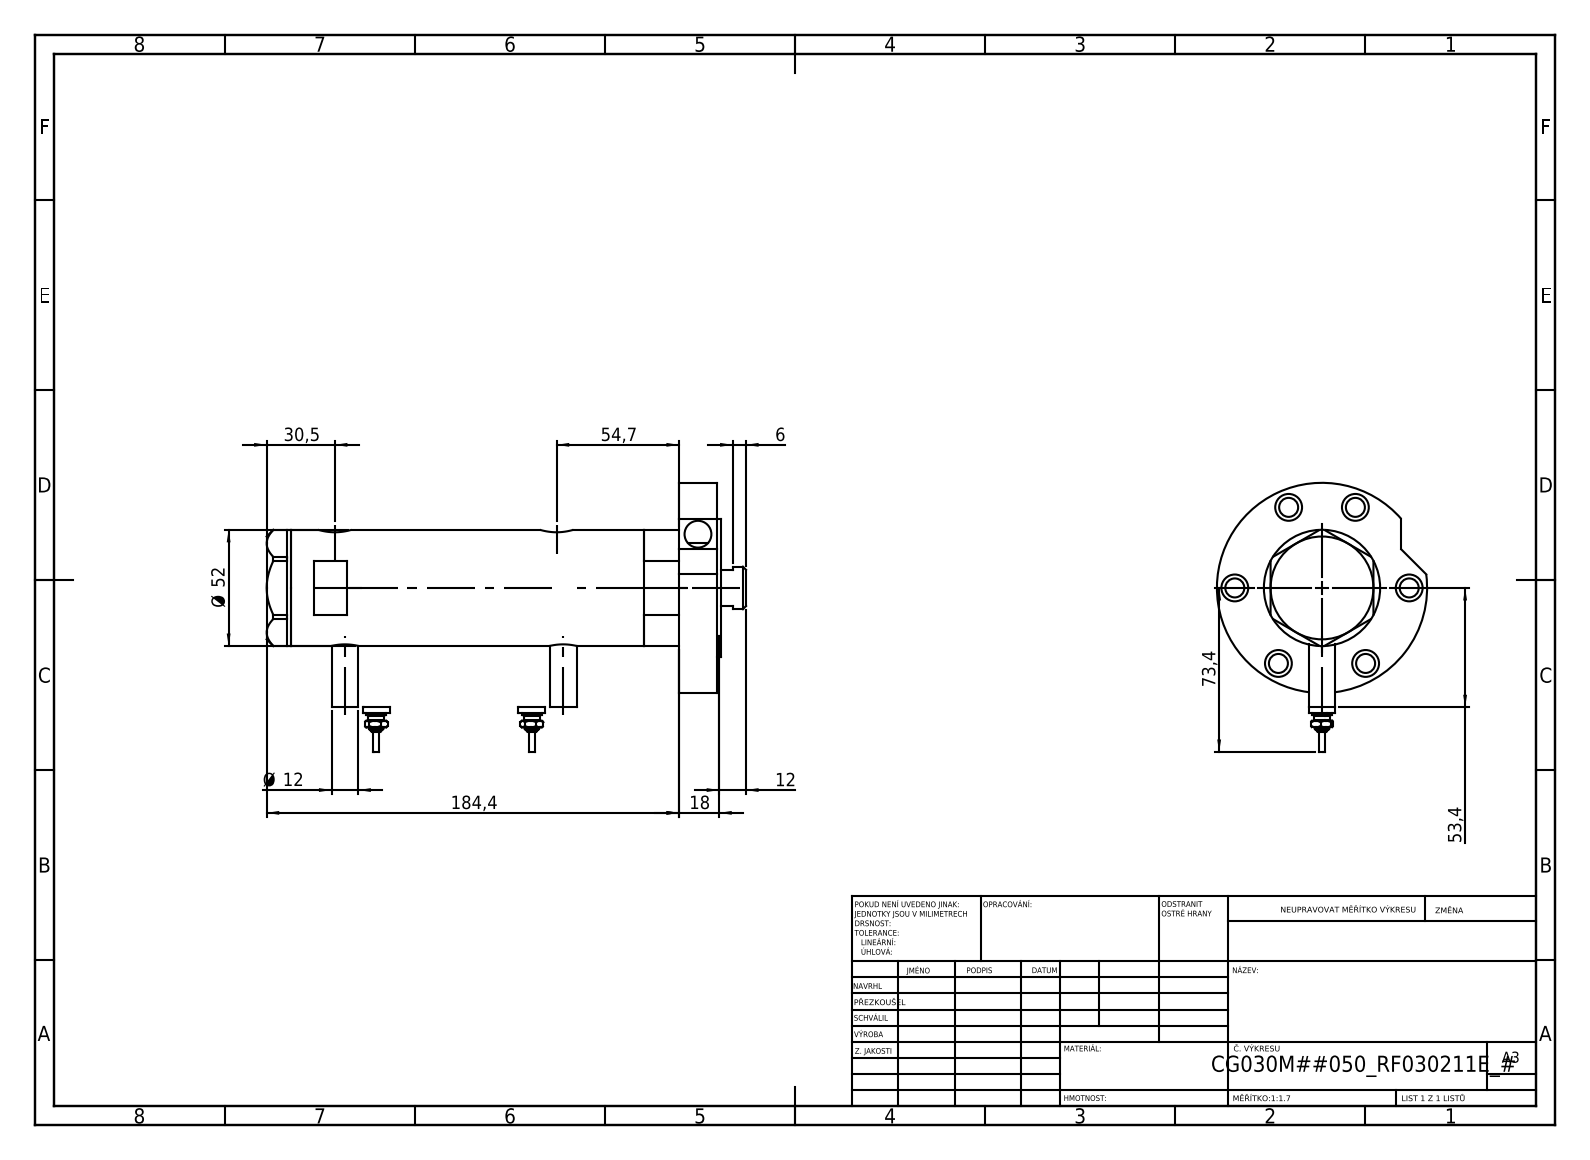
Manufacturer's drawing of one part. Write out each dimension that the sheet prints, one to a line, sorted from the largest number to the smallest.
184,4
73,4
54,7
53,4
Ø 52
30,5
18
12
Ø 12
6
